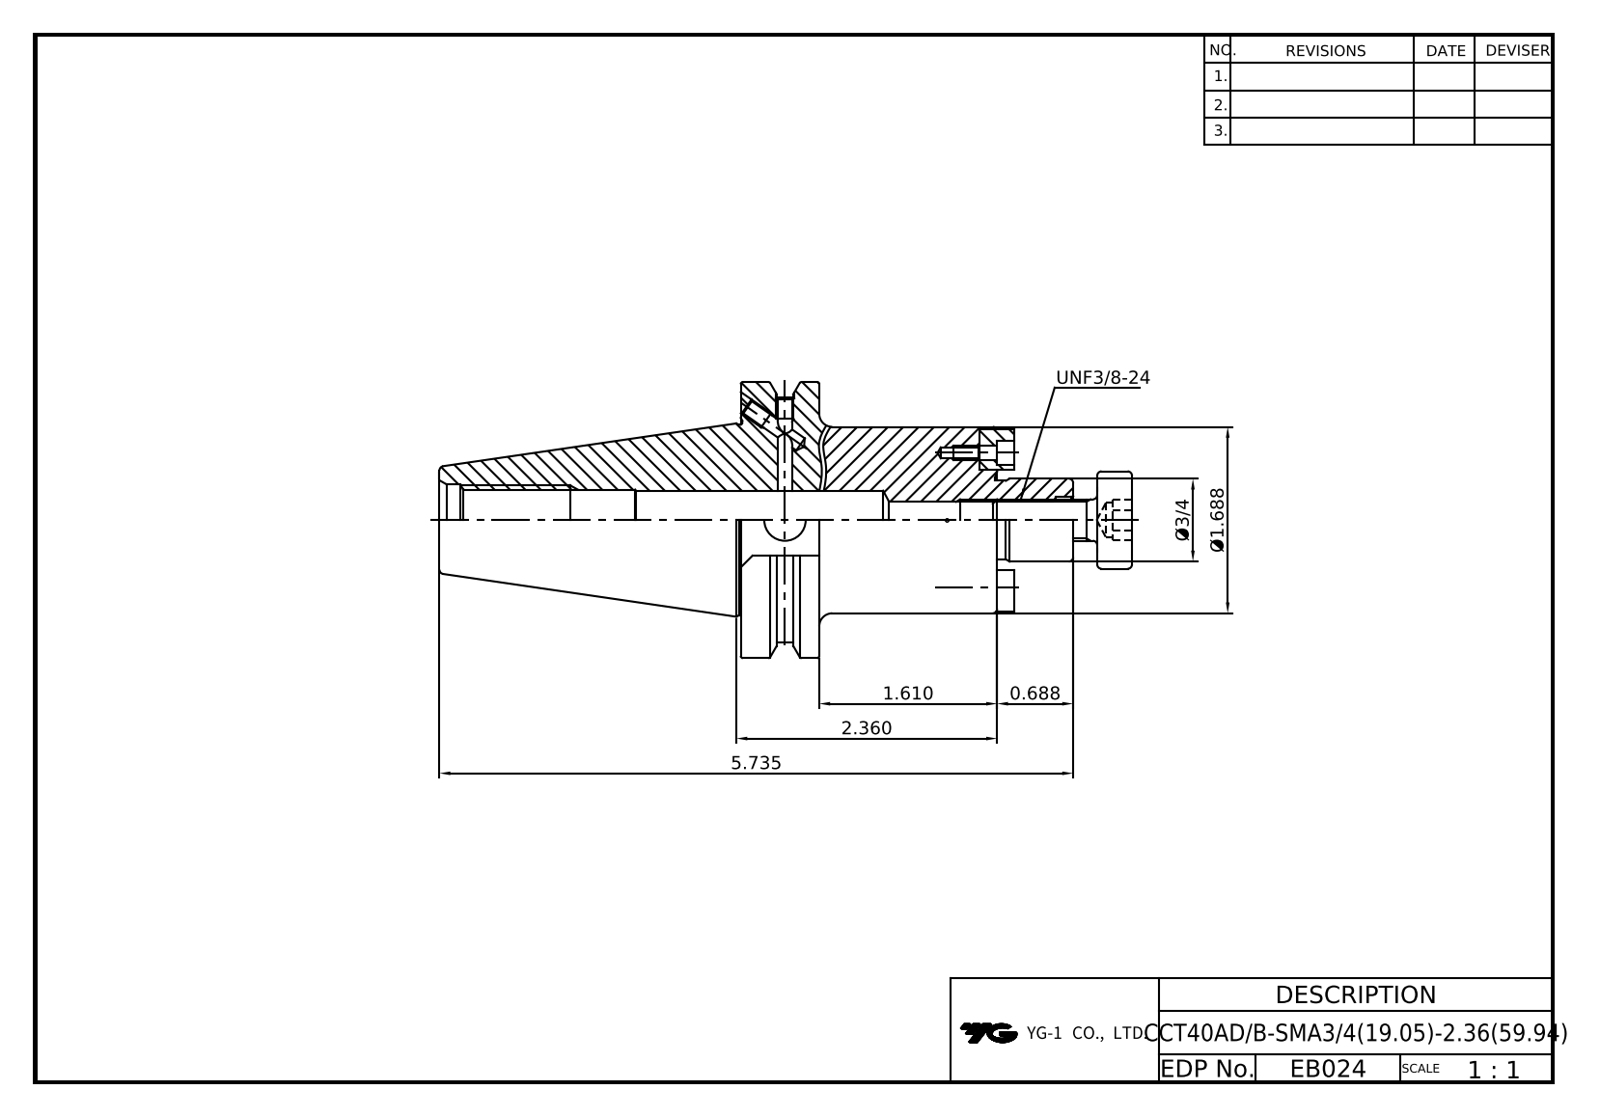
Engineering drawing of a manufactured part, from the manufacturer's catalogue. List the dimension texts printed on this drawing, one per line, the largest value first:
5.735
2.360
Ø1.688
1.610
Ø3/4
0.688
